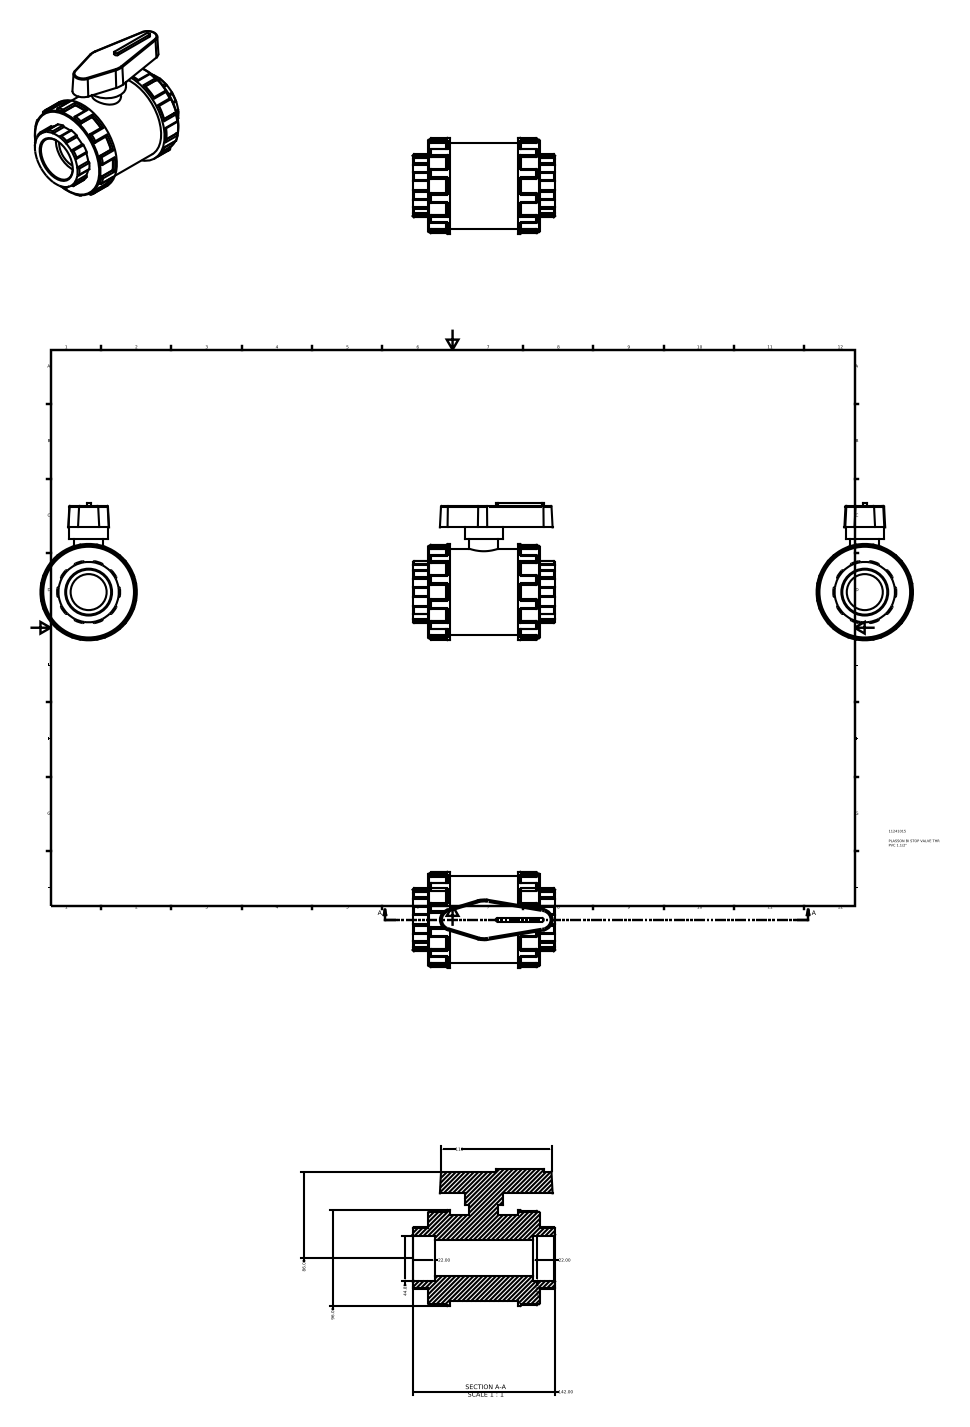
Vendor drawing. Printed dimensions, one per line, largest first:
142.00
110
96.00
86.00
44.85
44.85
22.00
22.00
